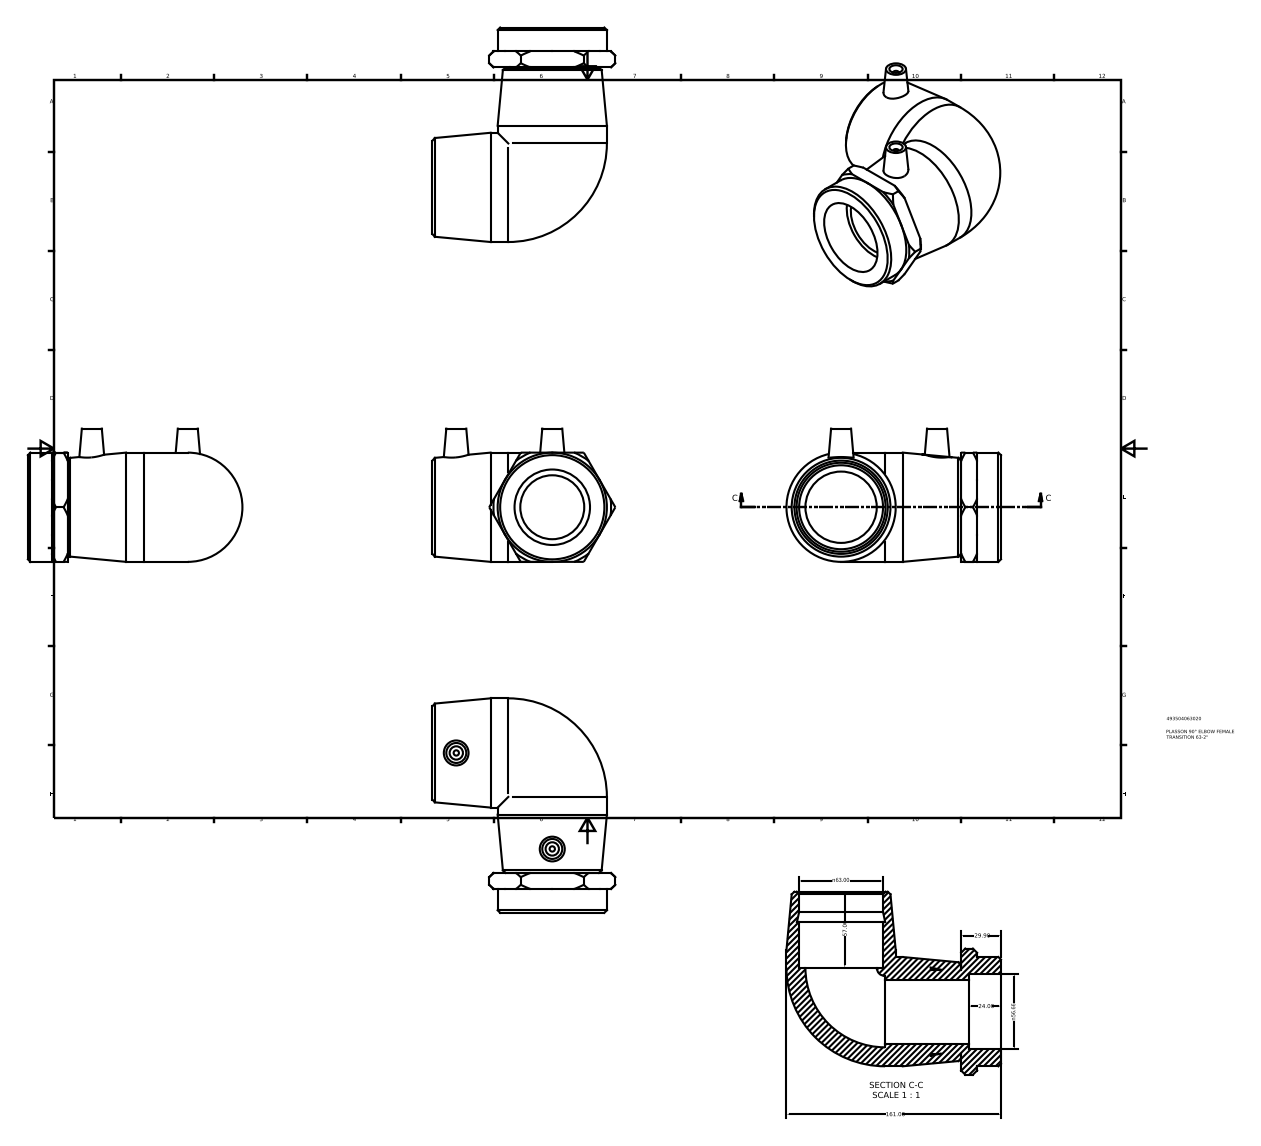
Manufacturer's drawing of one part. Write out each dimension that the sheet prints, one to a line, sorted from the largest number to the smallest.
161.00
n63.00
57.00
n56.66
29.90
24.00
